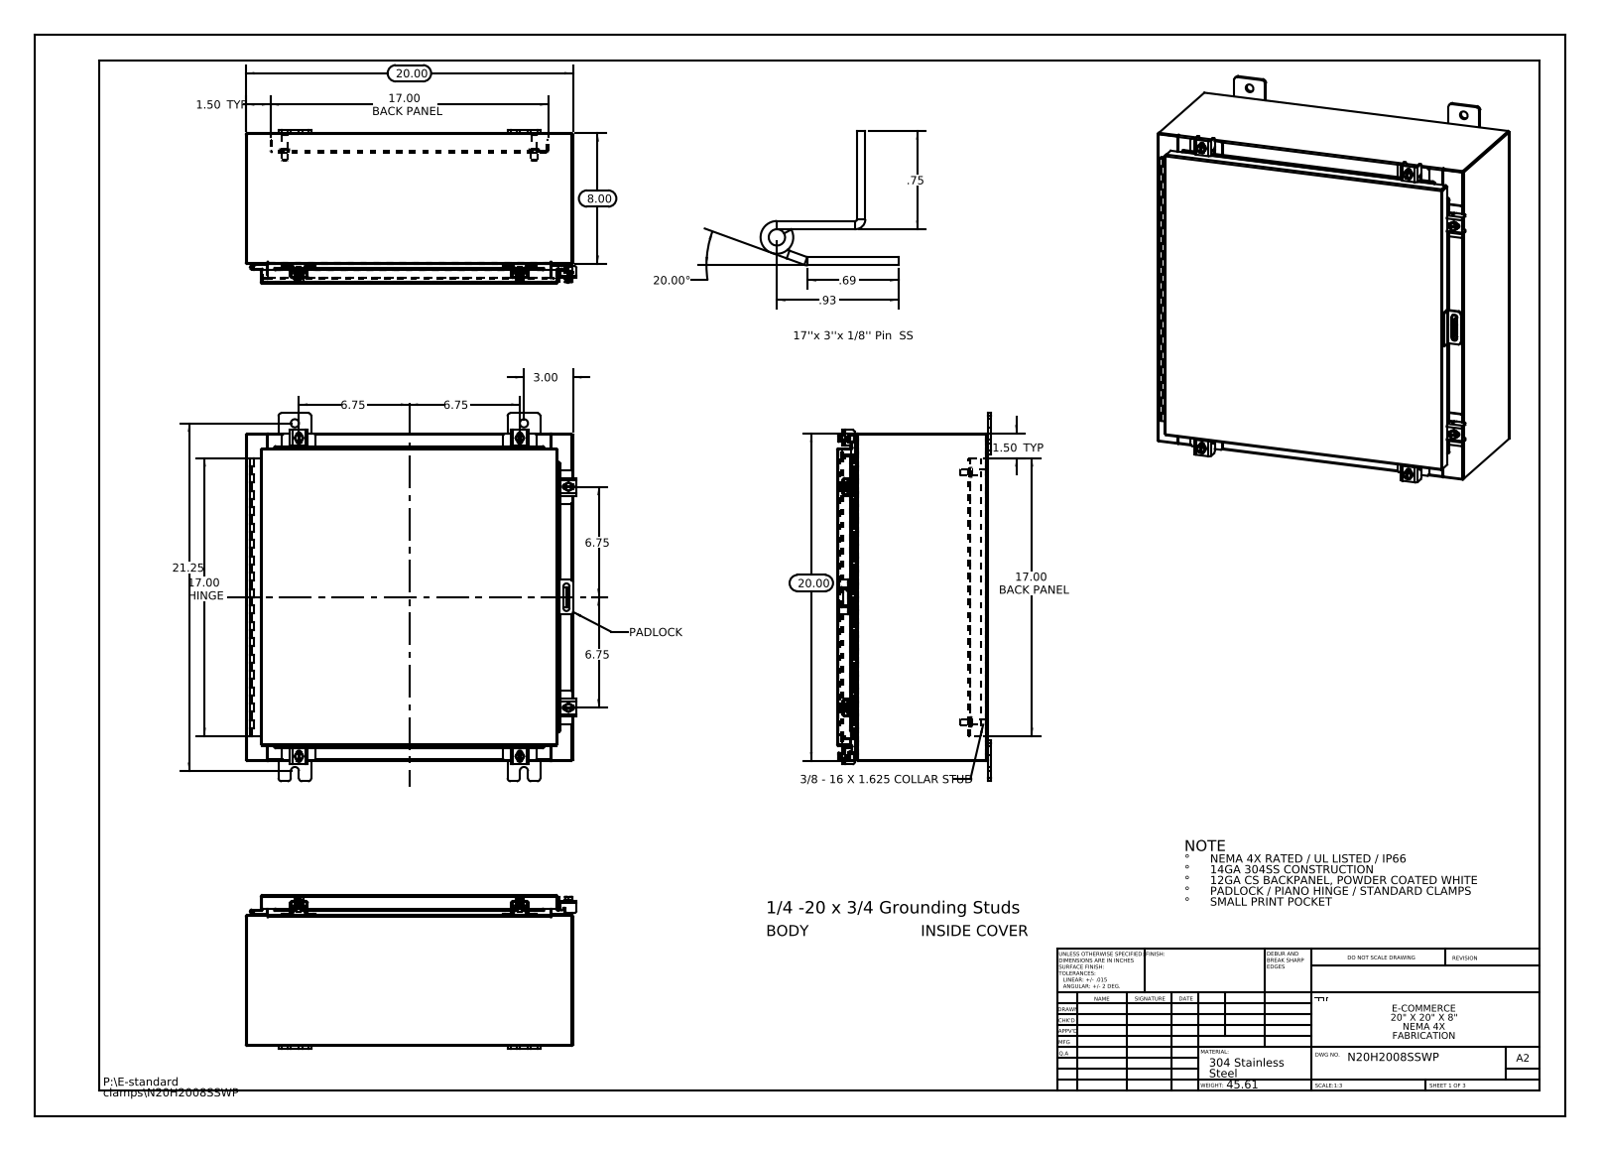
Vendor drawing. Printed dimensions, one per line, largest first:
21.25
20.00
20.00
20.00°
17.00 HINGE
17.00 BACK PANEL
17.00 BACK PANEL
8.00
6.75
6.75
6.75
6.75
3.00
1.50 TYP
1.50 TYP
.93
.75
.69
